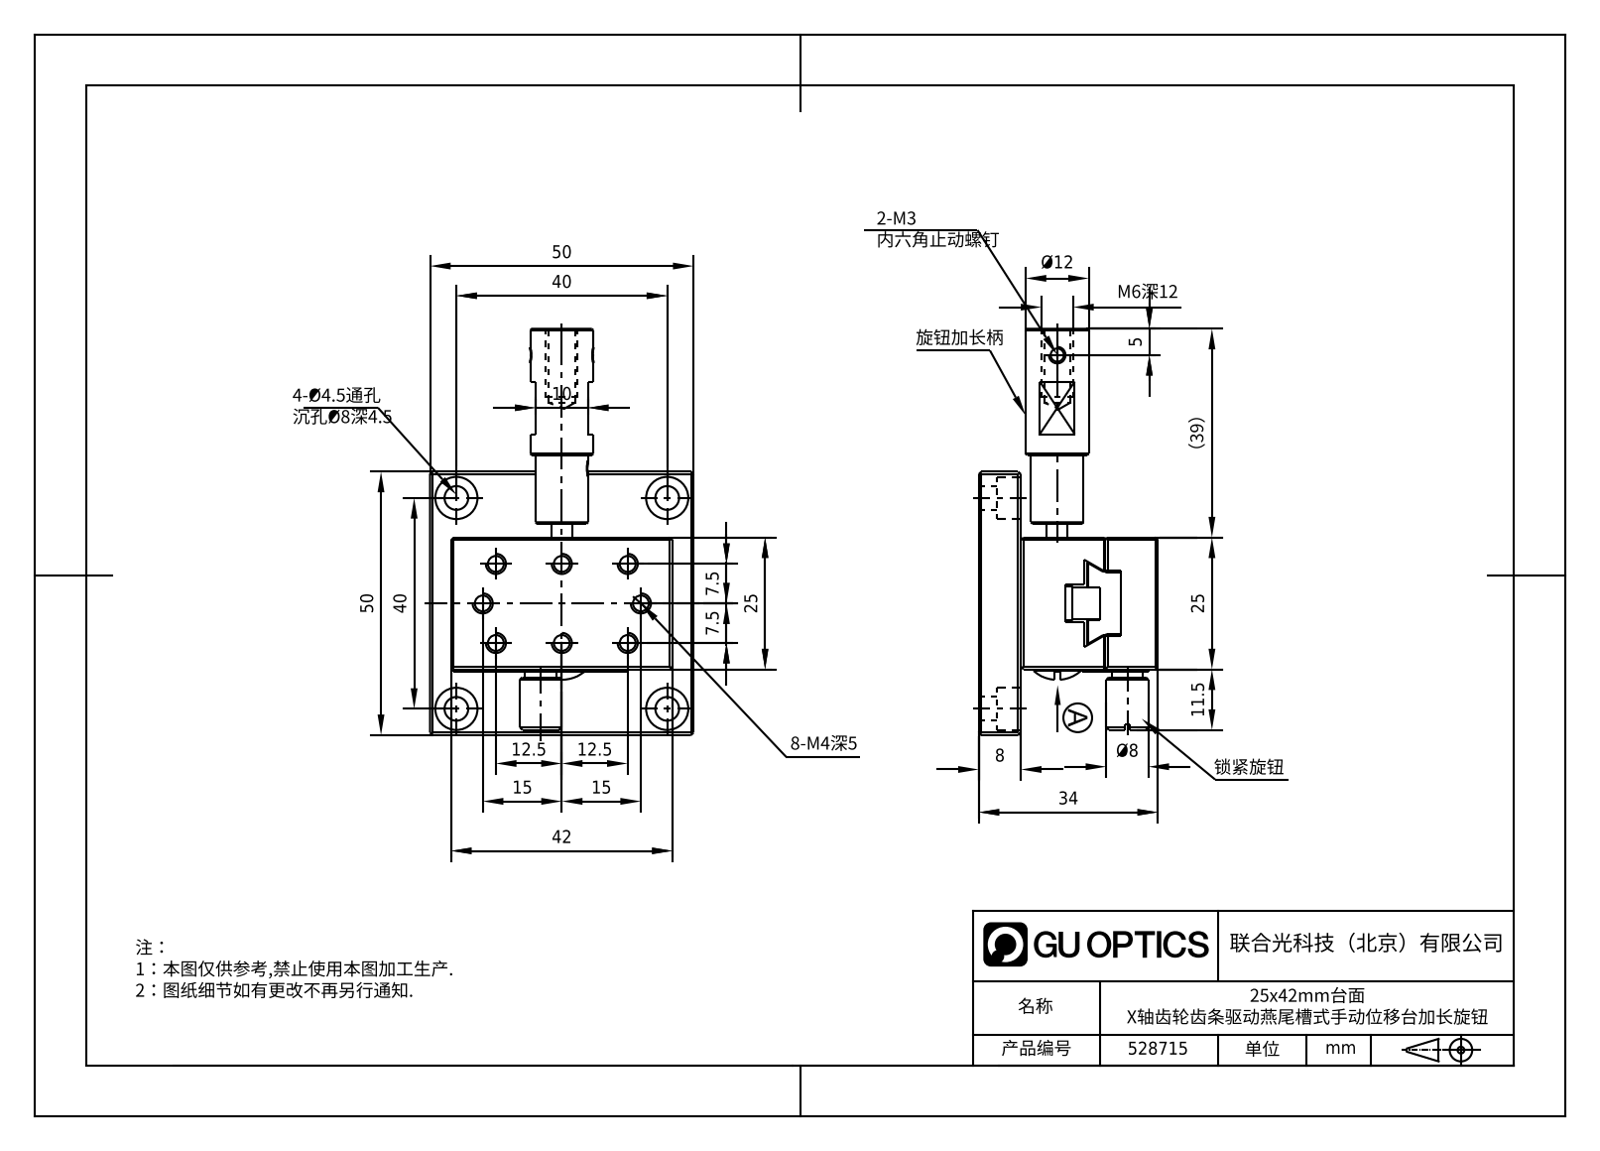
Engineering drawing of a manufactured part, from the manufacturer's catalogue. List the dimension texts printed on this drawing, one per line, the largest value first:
50
50
42
40
40
（39）
34
25
25
15
15
12.5
12.5
Ø12
11.5
10
8
Ø8
7.5
7.5
M6深12
5
